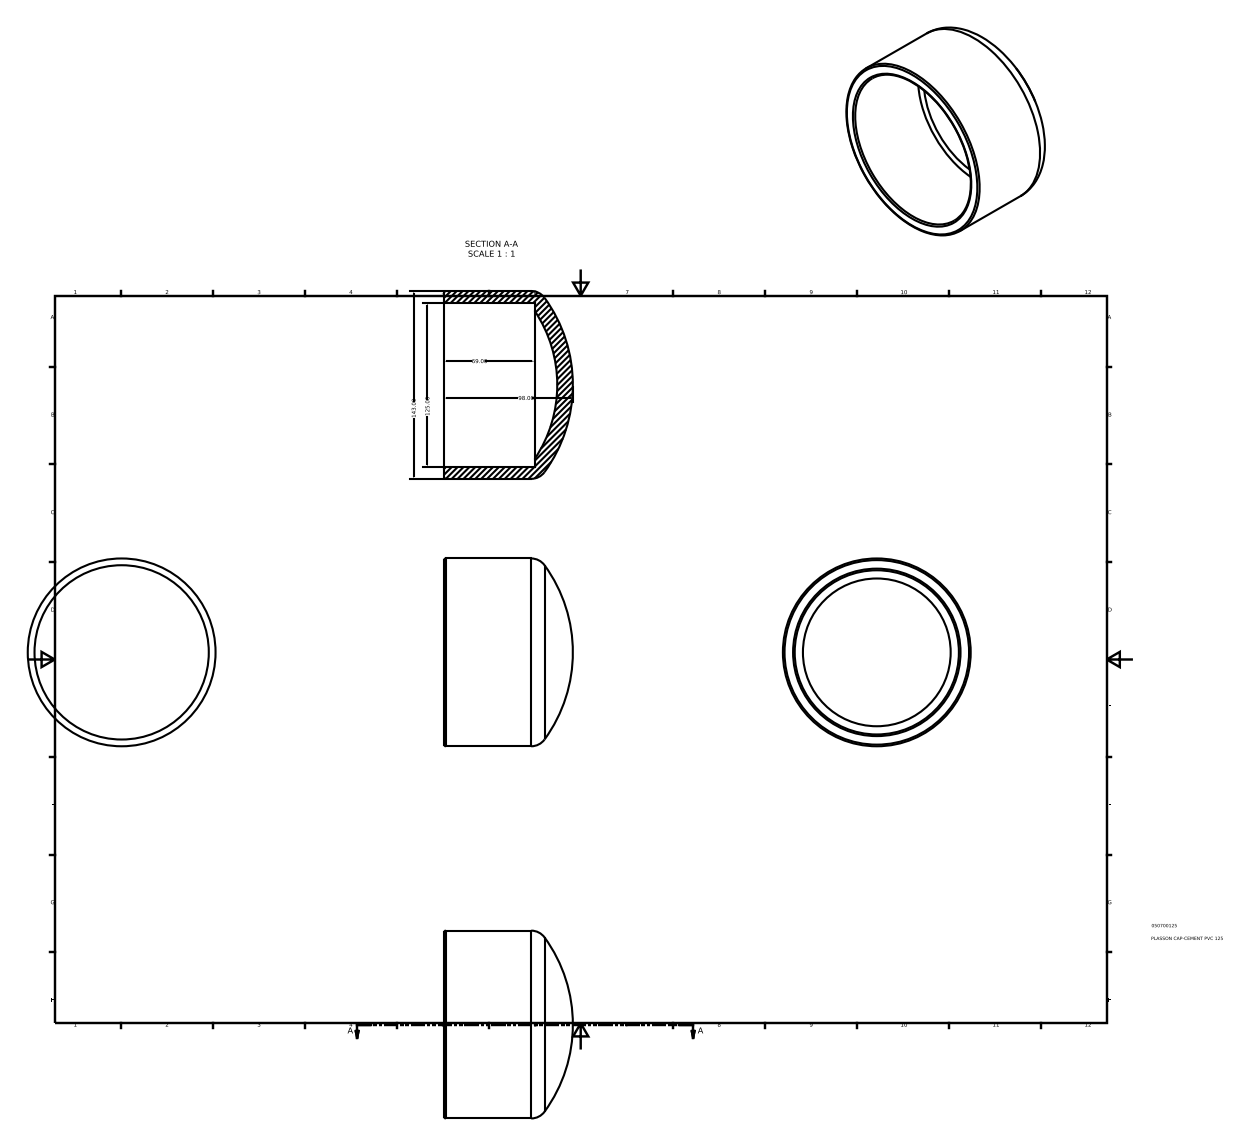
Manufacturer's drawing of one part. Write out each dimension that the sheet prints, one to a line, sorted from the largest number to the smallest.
143.00
125.00
98.00
69.00
